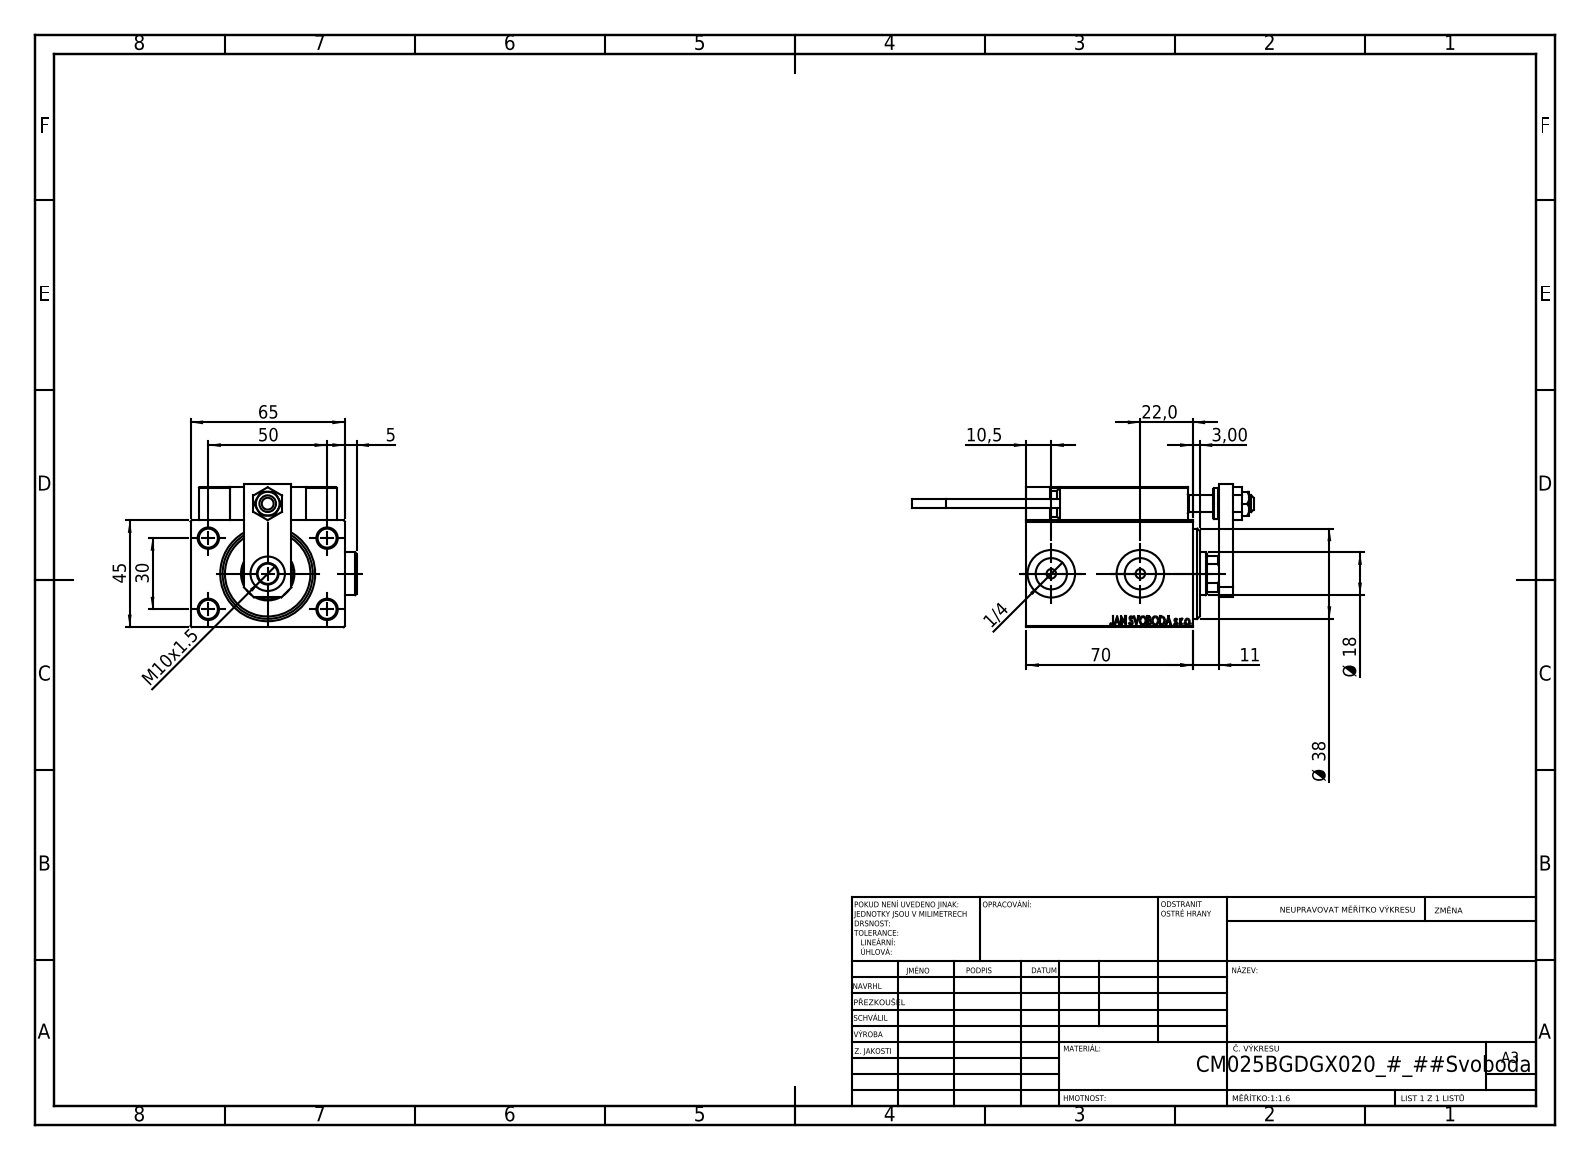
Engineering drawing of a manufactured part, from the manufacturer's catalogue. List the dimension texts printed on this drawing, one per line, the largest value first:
70
65
50
45
Ø 38
30
22,0
Ø 18
11
10,5
M10x1.5
5
3,00
1/4
